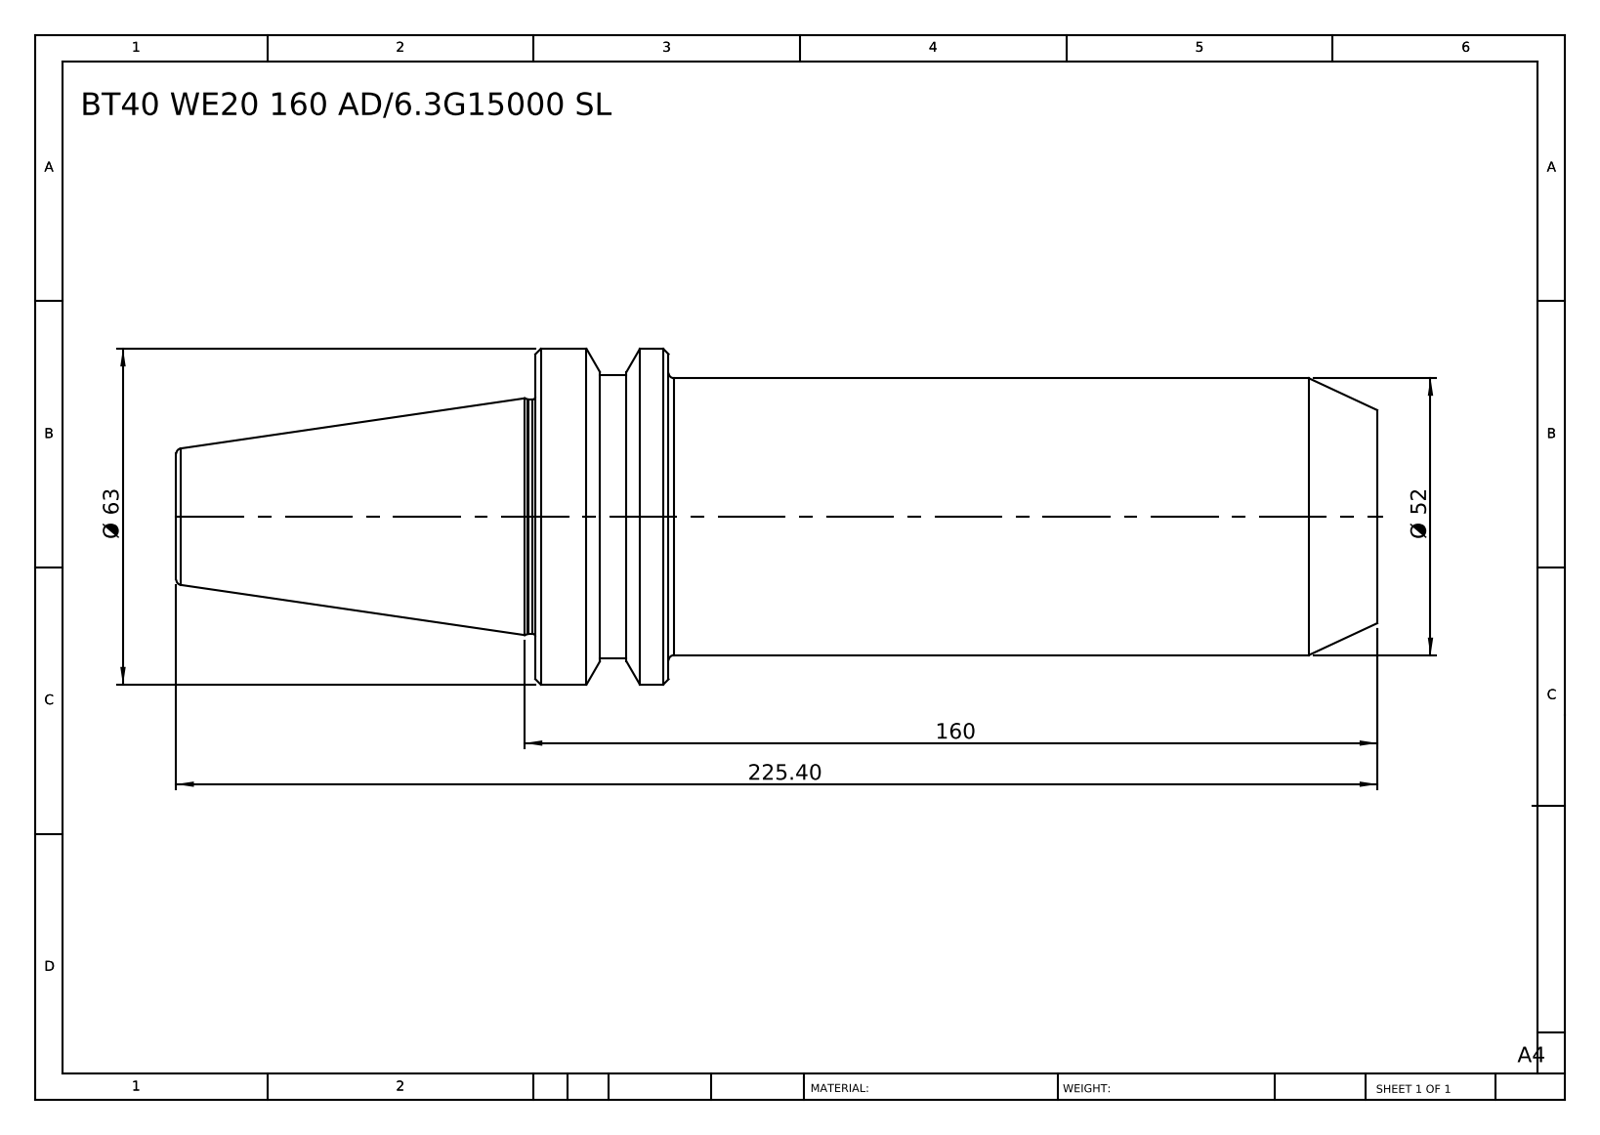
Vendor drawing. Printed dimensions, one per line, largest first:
225.40
160
Ø 63
Ø 52
